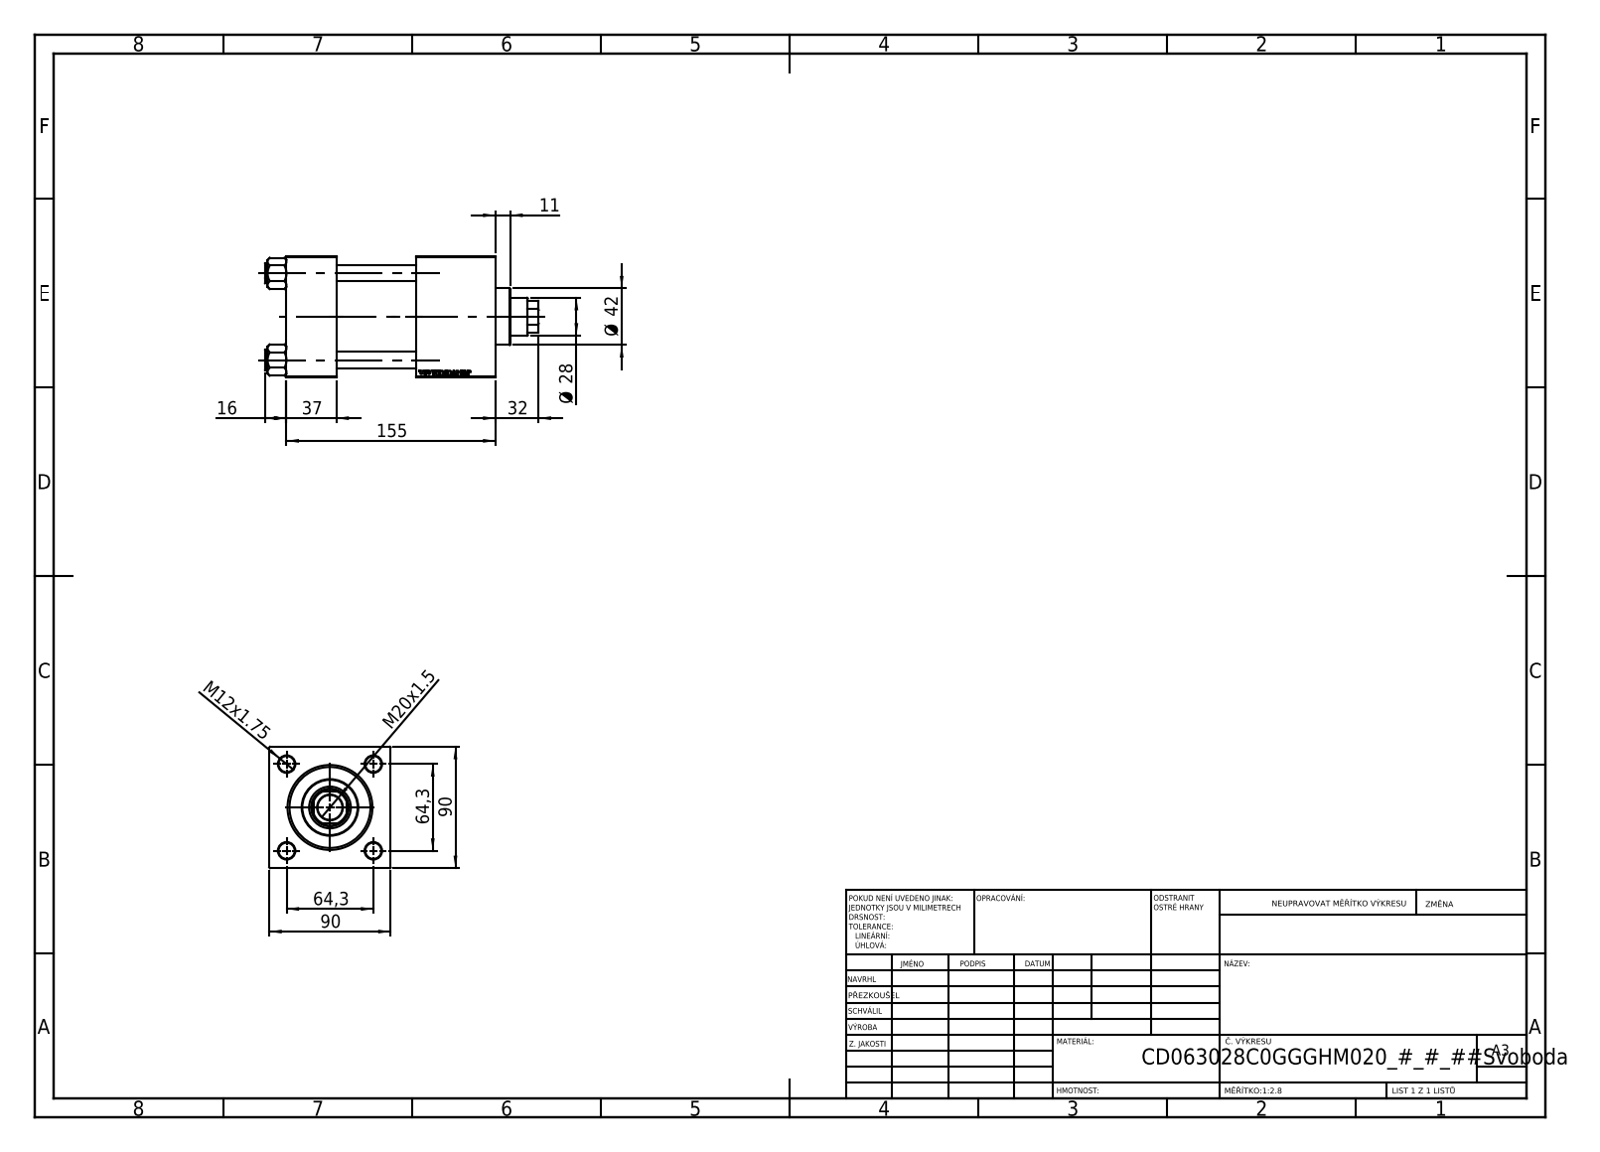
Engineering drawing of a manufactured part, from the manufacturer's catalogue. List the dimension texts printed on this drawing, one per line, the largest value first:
155
90
90
64,3
64,3
Ø 42
37
32
Ø 28
M20x1.5
16
M12x1.75
11
